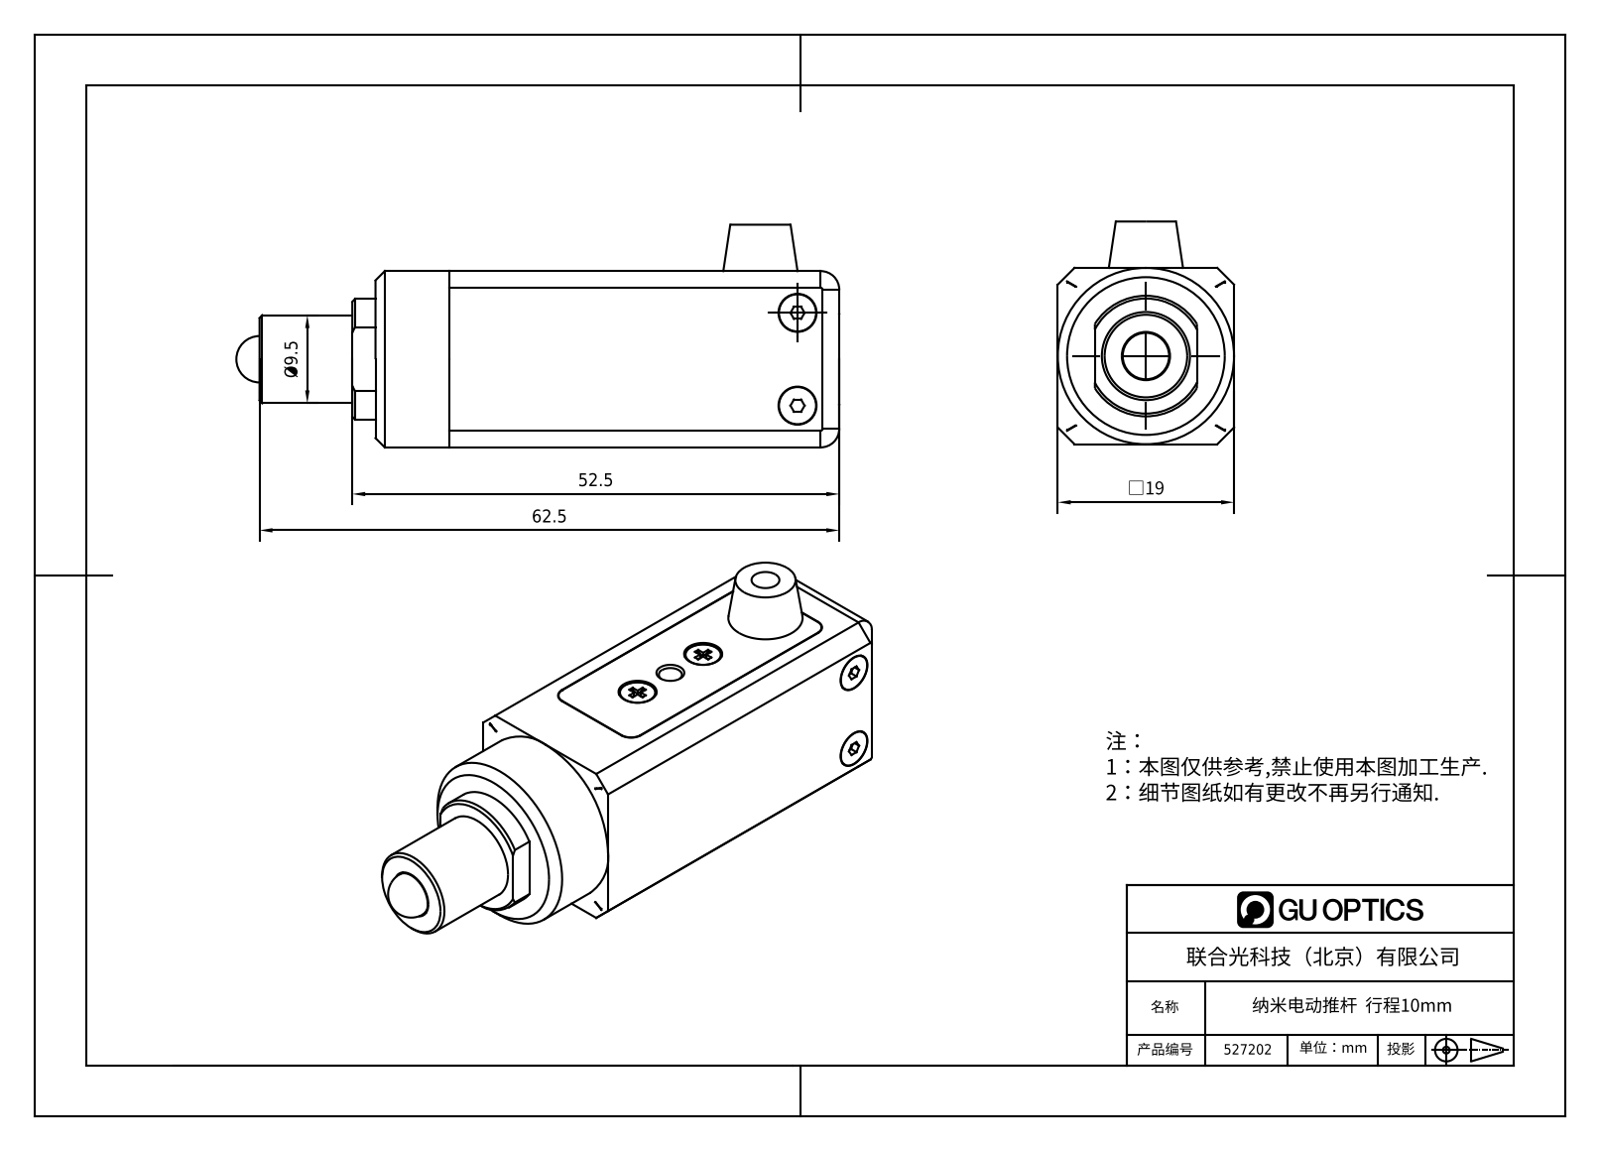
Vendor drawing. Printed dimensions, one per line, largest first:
62.5
52.5
□19
Ø9.5
